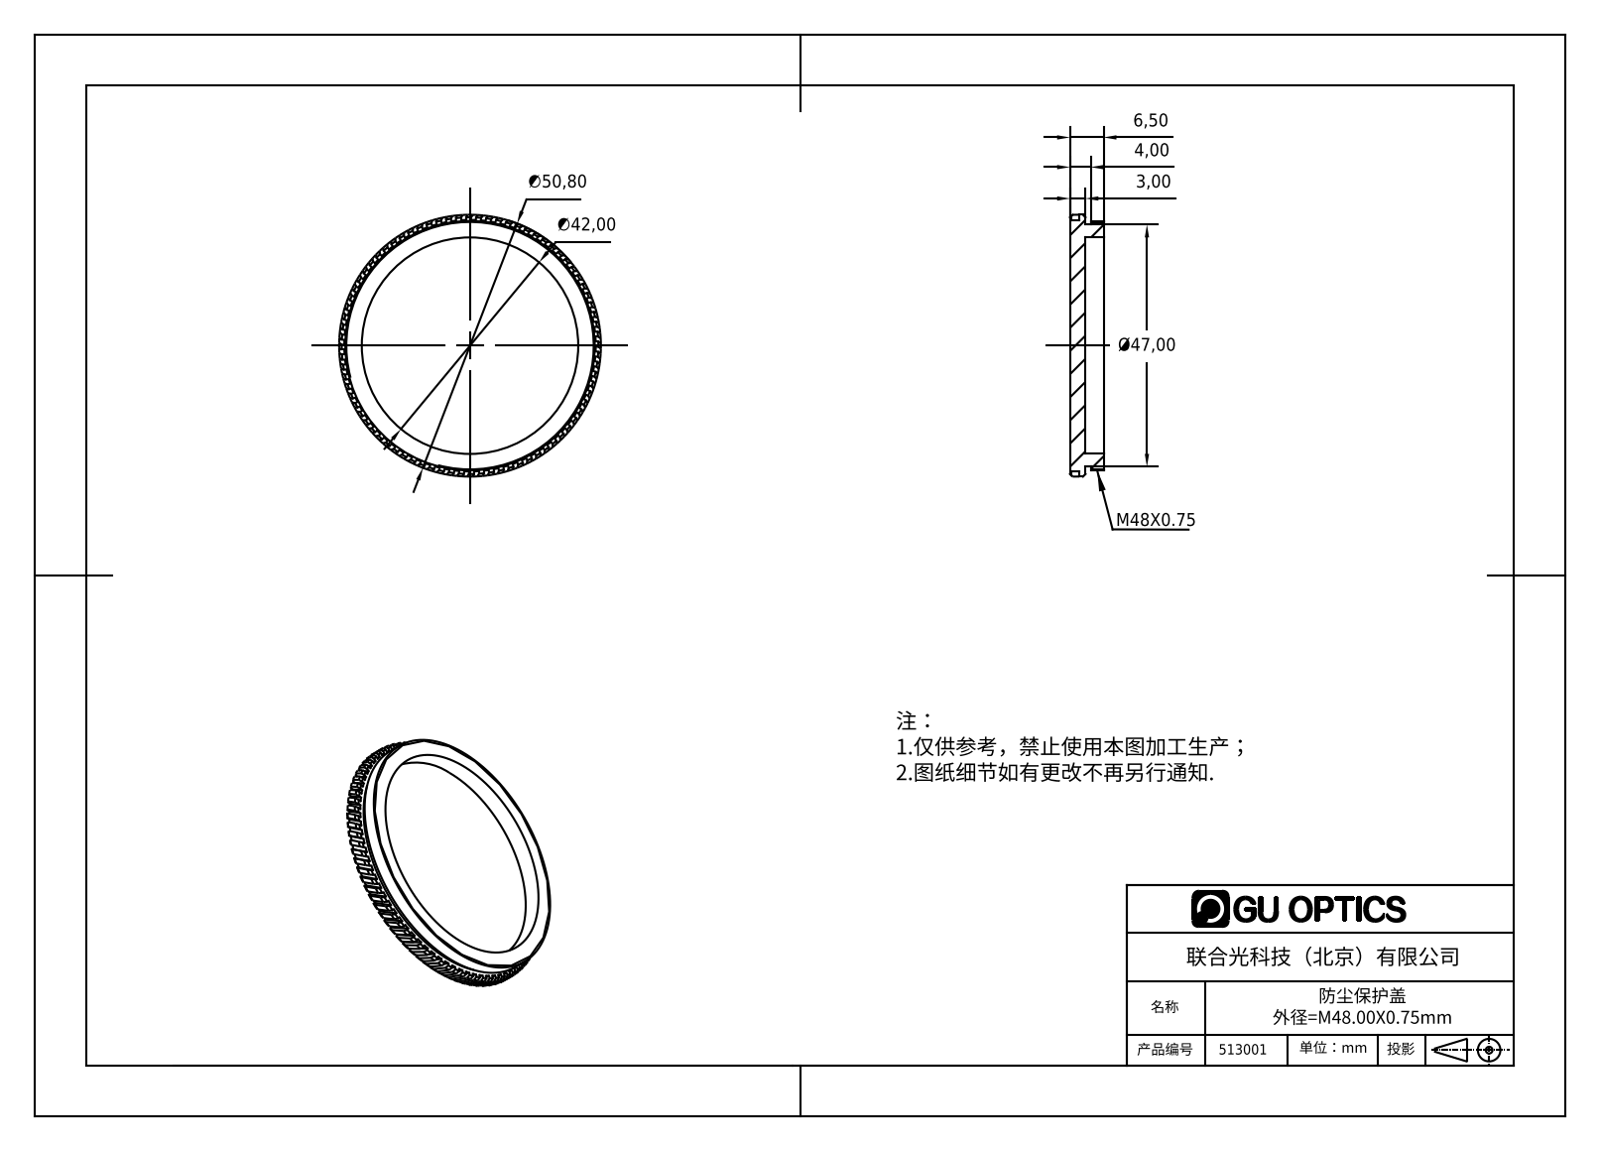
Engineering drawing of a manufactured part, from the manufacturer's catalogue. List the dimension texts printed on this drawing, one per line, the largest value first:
∅50,80
Ø47,00
∅42,00
6,50
4,00
3,00
